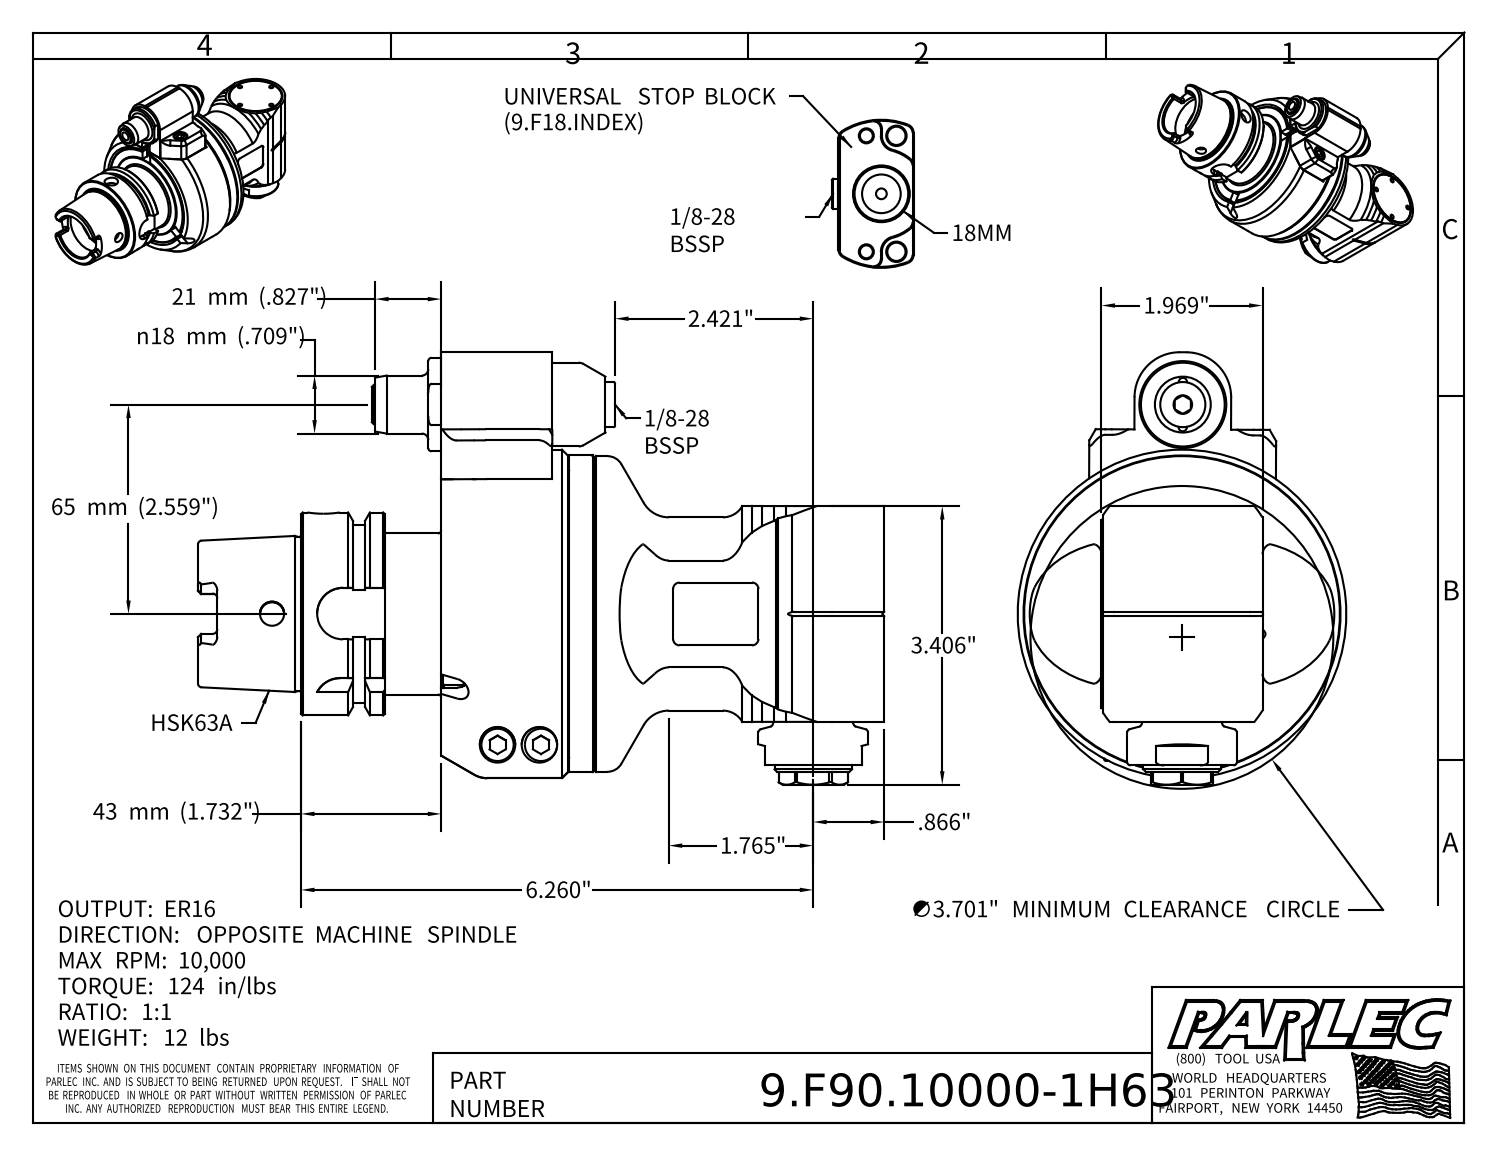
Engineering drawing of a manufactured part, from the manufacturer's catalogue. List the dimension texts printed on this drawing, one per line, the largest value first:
65 mm (2.559")
43 mm (1.732")
21 mm (.827")
n18 mm (.709")
6.260"
∅3.701" MINIMUM CLEARANCE CIRCLE
3.406"
2.421"
1.969"
1.765"
.866"
